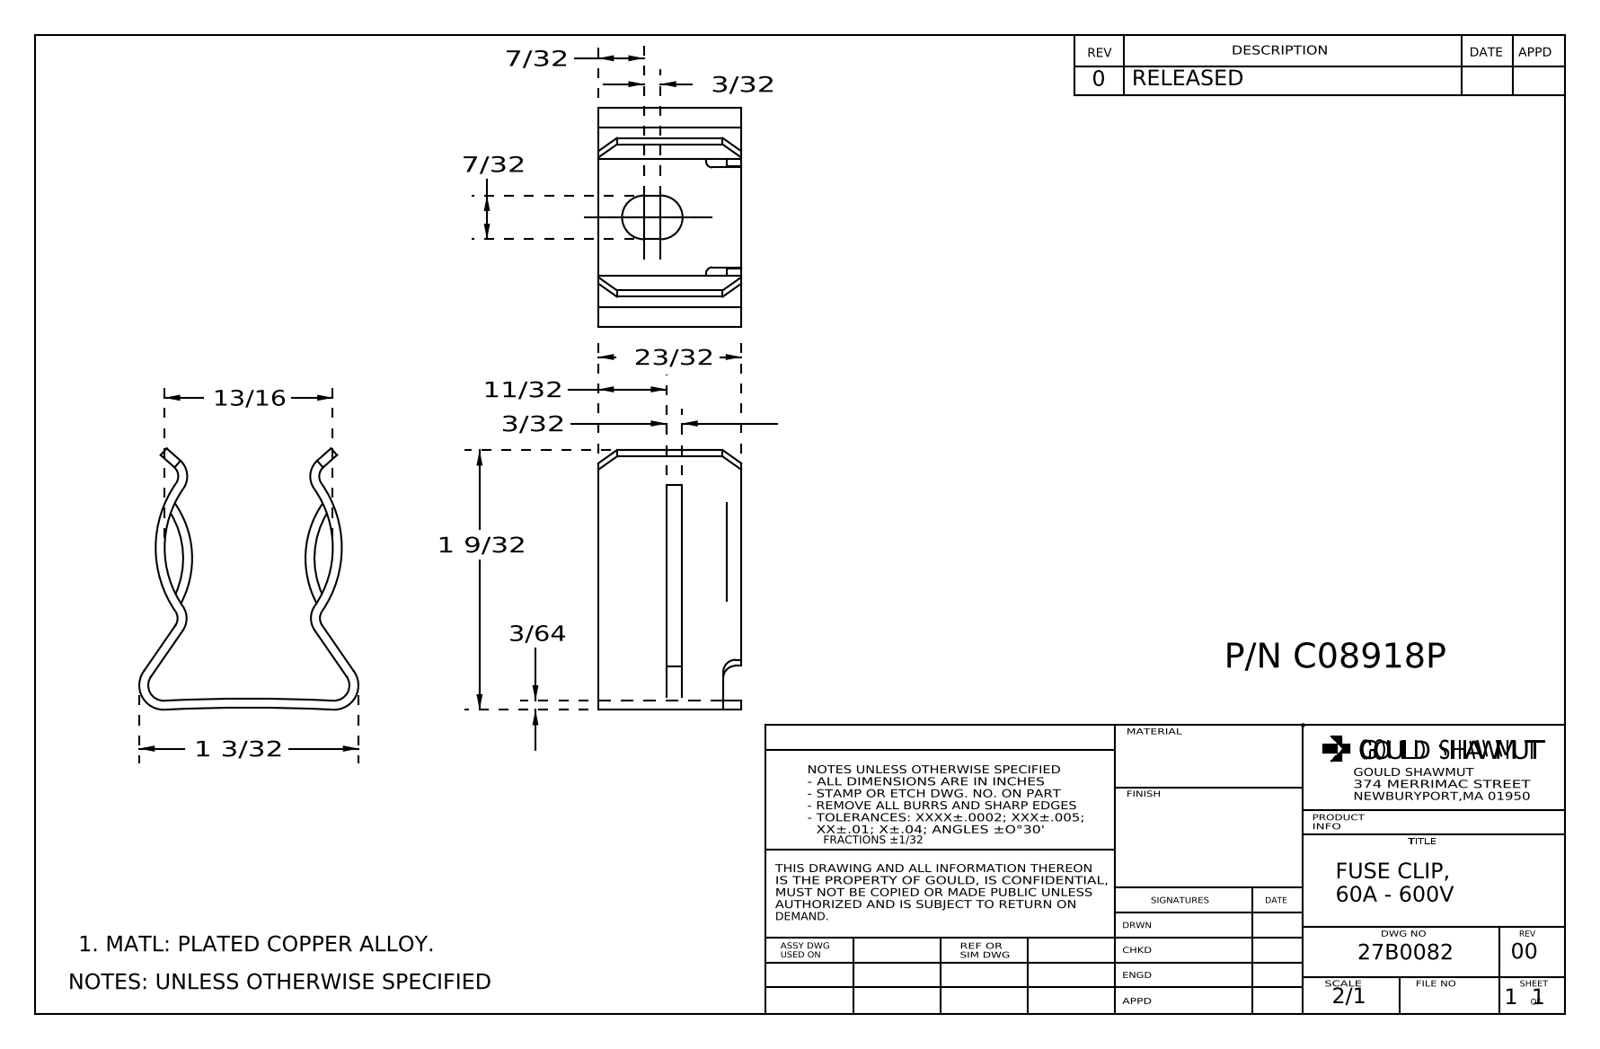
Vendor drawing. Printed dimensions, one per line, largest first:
1 9/32
1 3/32
13/16
23/32
11/32
7/32
7/32
3/32
3/32
3/64
